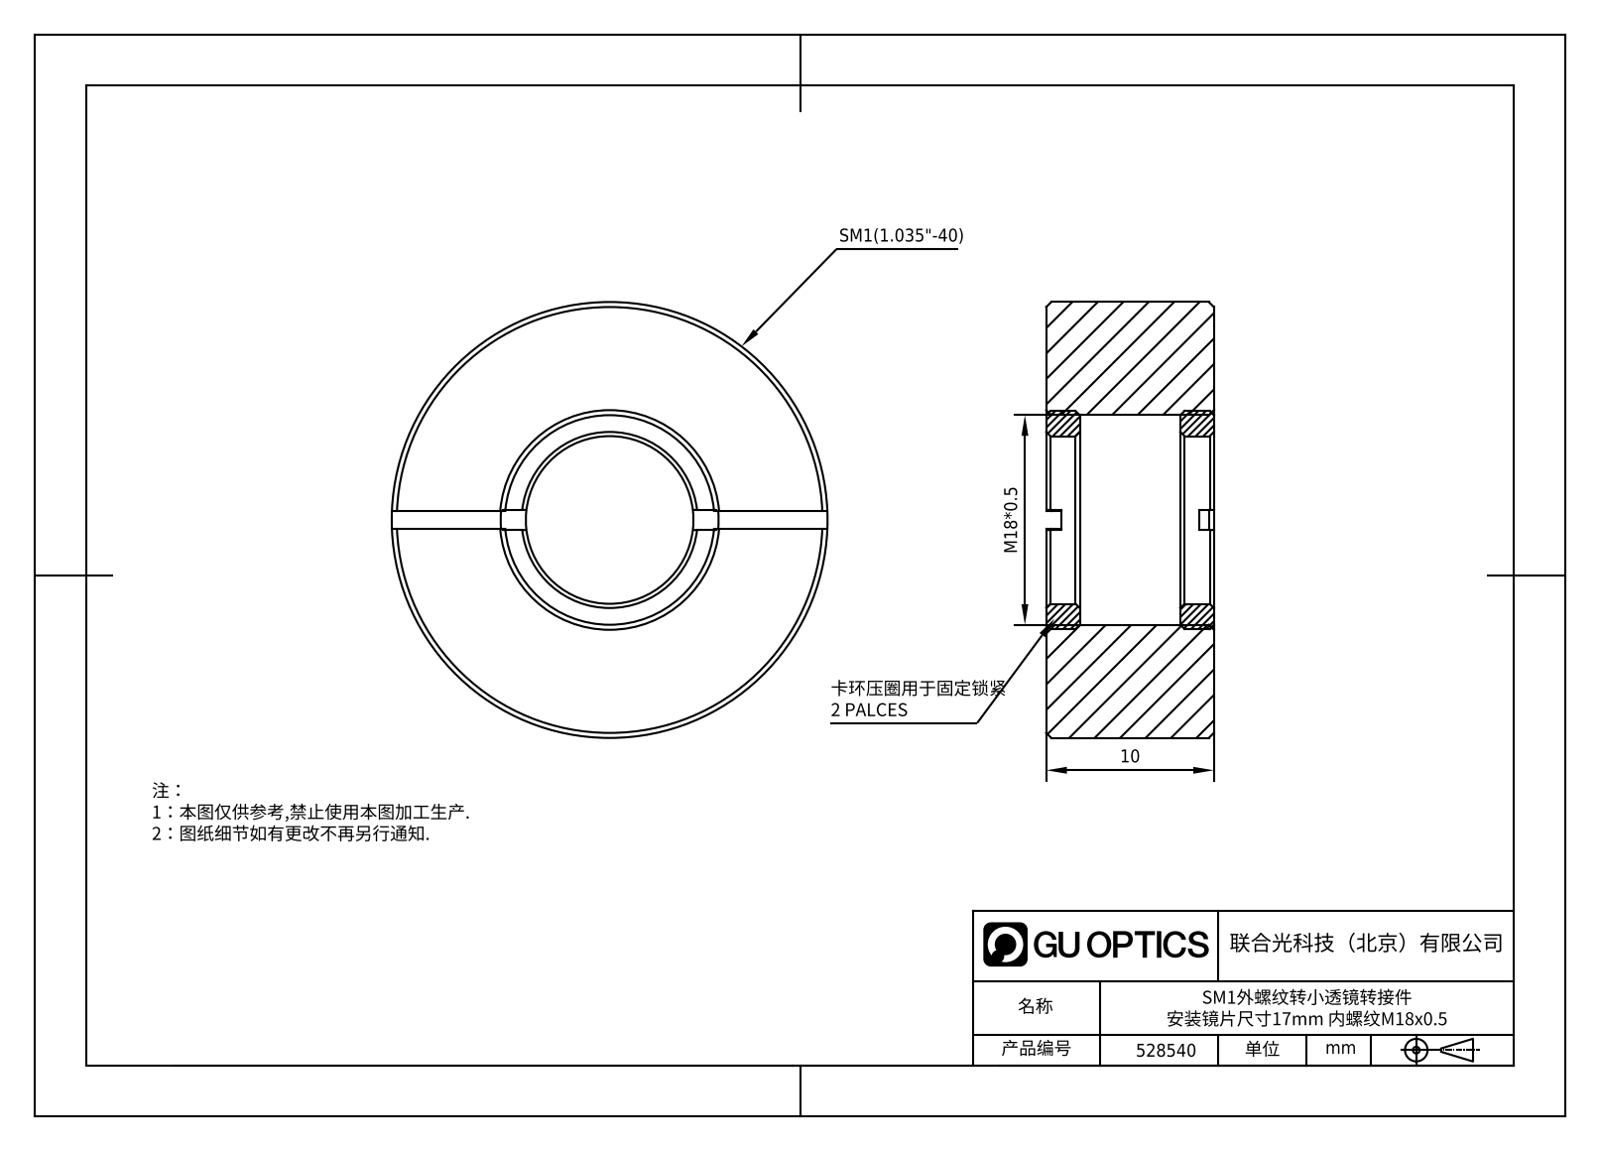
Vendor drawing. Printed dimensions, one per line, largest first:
M18*0.5
10
